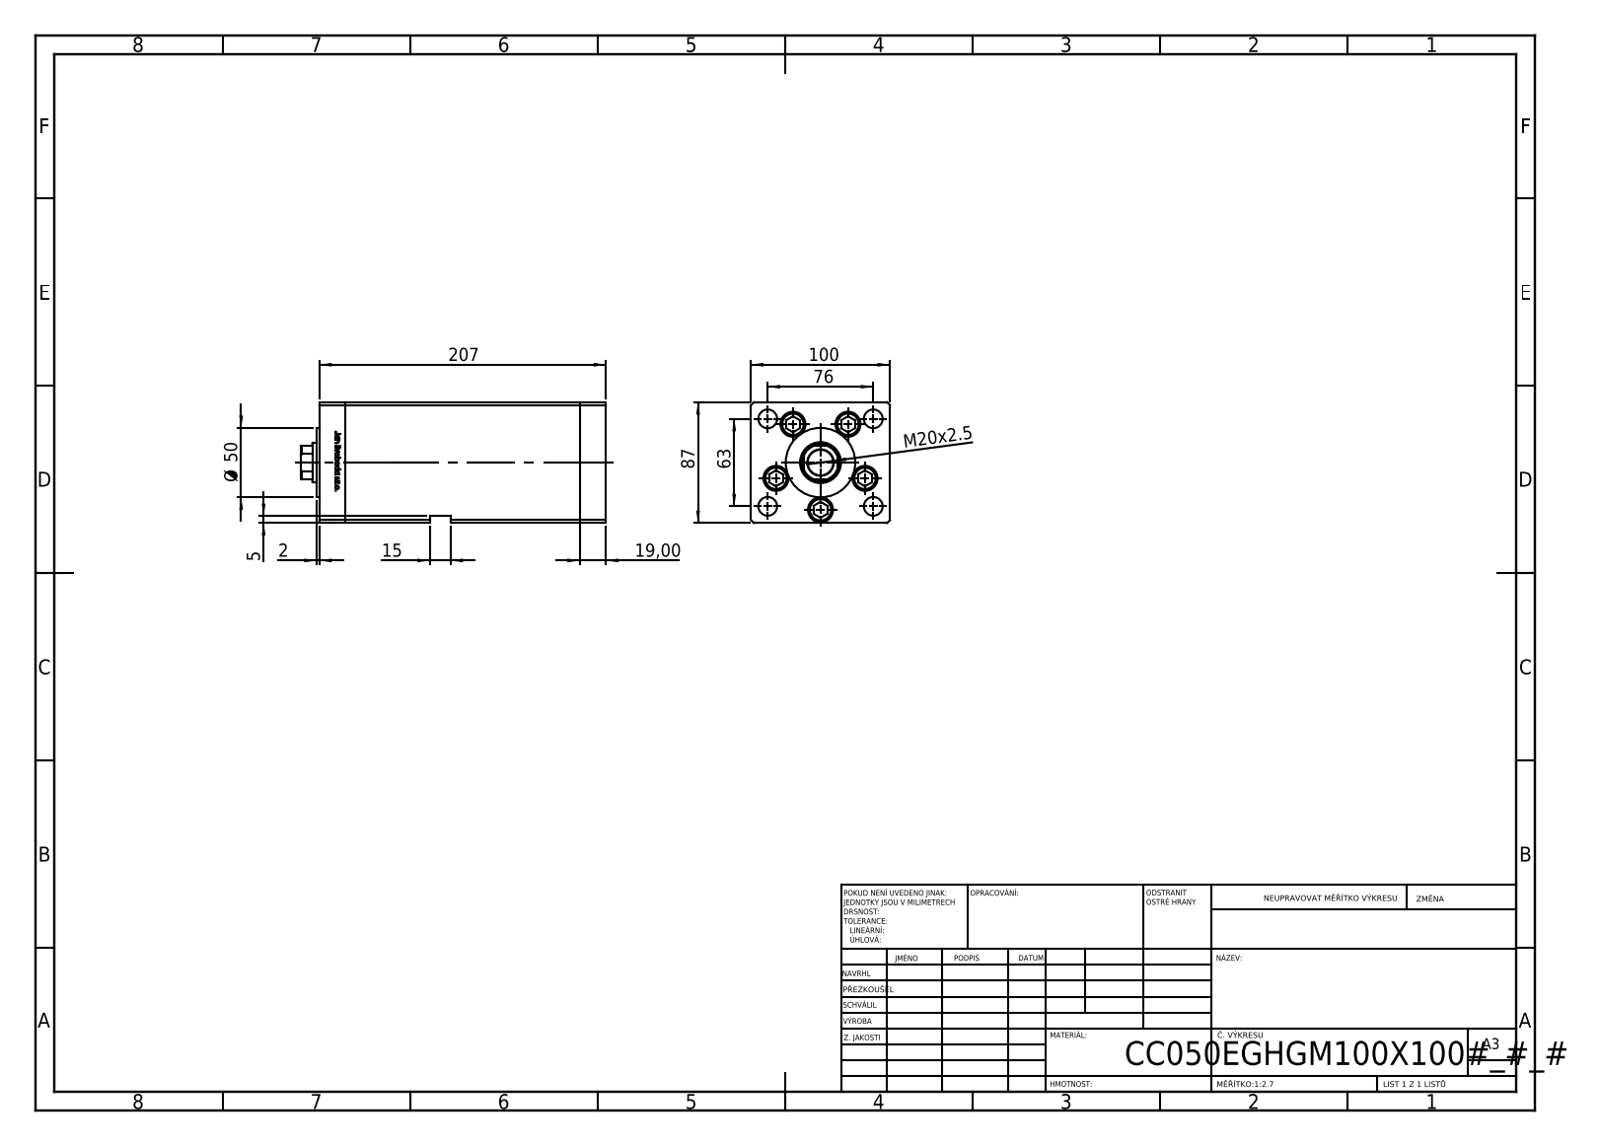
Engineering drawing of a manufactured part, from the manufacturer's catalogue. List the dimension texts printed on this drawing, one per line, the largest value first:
207
100
87
76
63
Ø 50
M20x2.5
19,00
15
5
2
